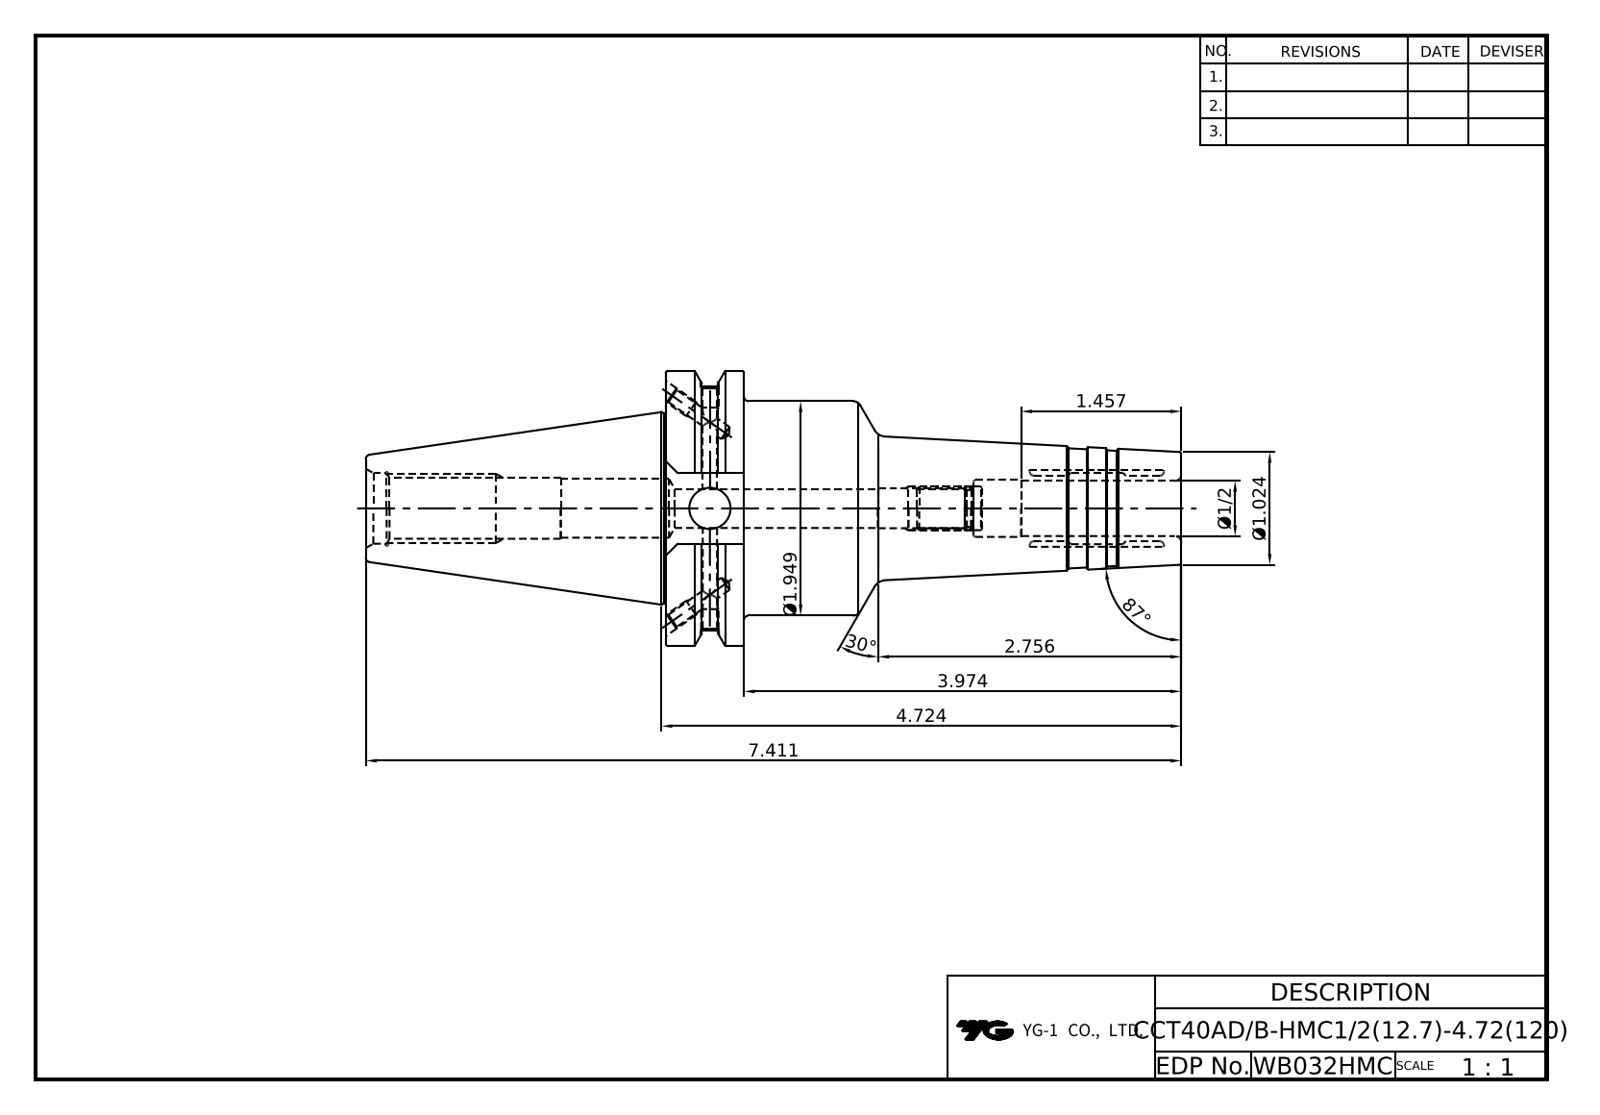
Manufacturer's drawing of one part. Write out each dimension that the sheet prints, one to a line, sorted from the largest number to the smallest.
87°
30°
7.411
4.724
3.974
2.756
Ø1.949
1.457
Ø1.024
Ø1/2
